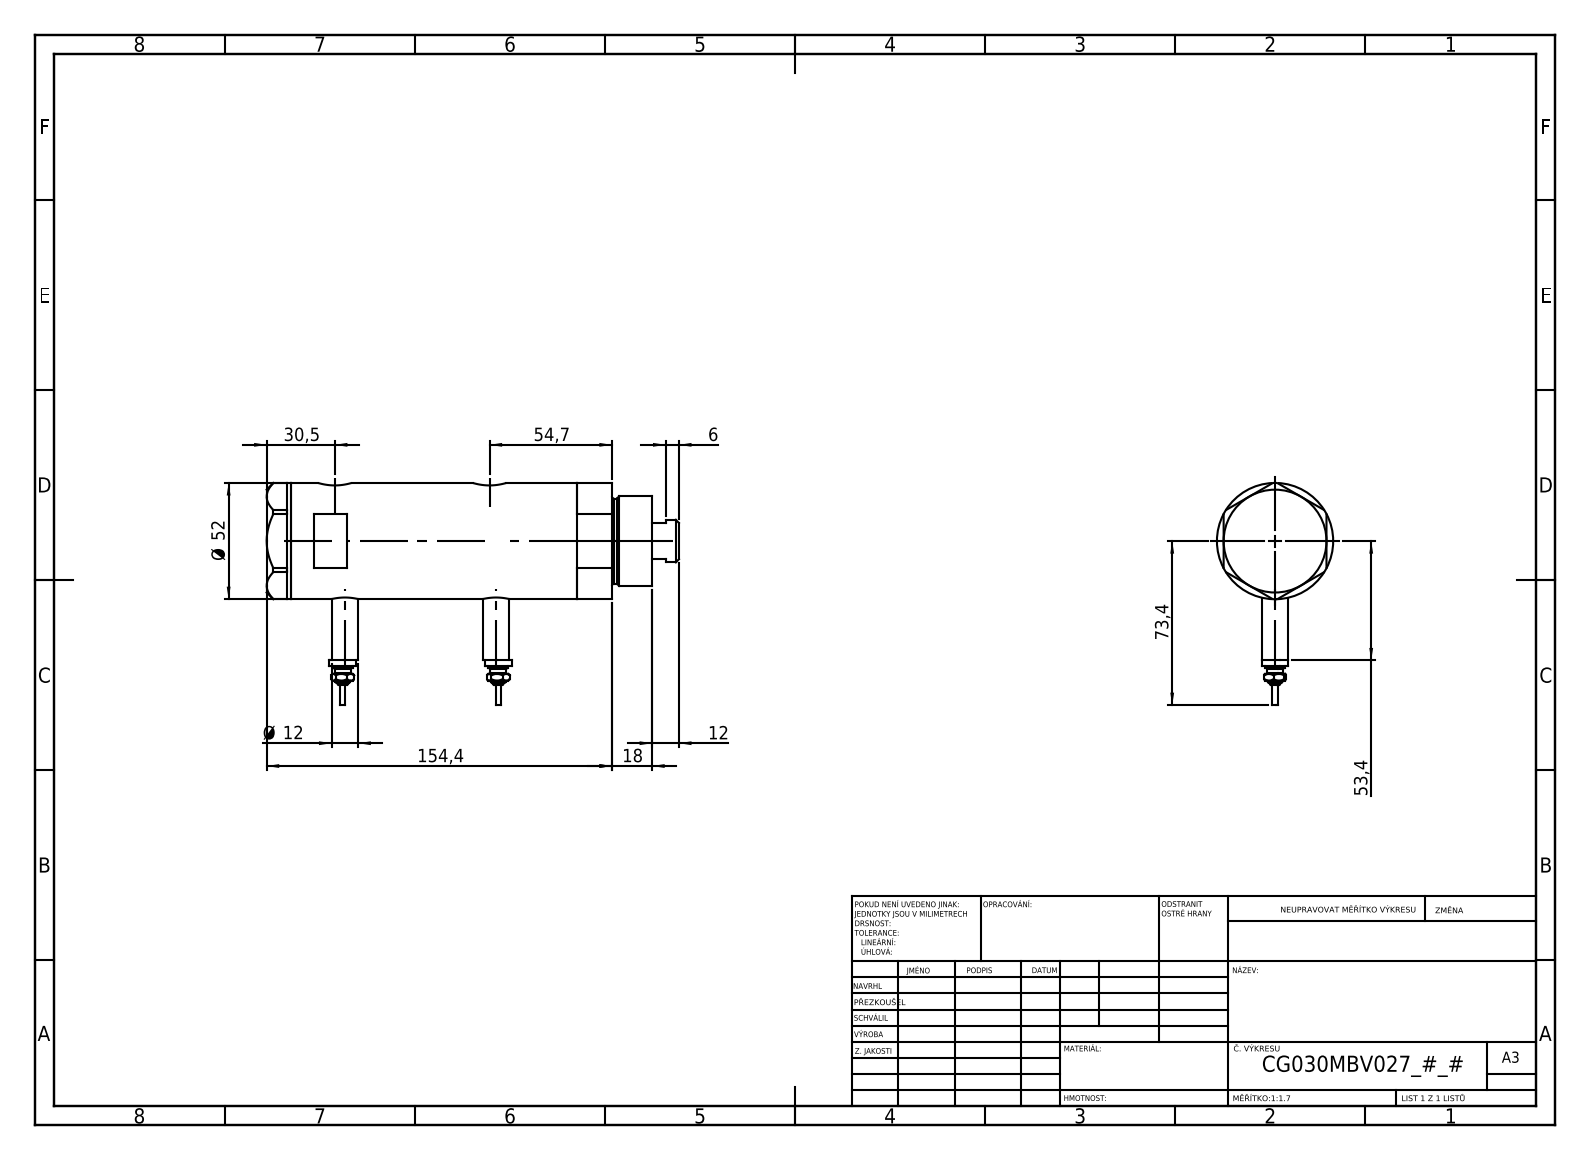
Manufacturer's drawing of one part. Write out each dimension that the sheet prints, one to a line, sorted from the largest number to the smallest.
154,4
73,4
54,7
53,4
Ø 52
30,5
18
12
Ø 12
6
